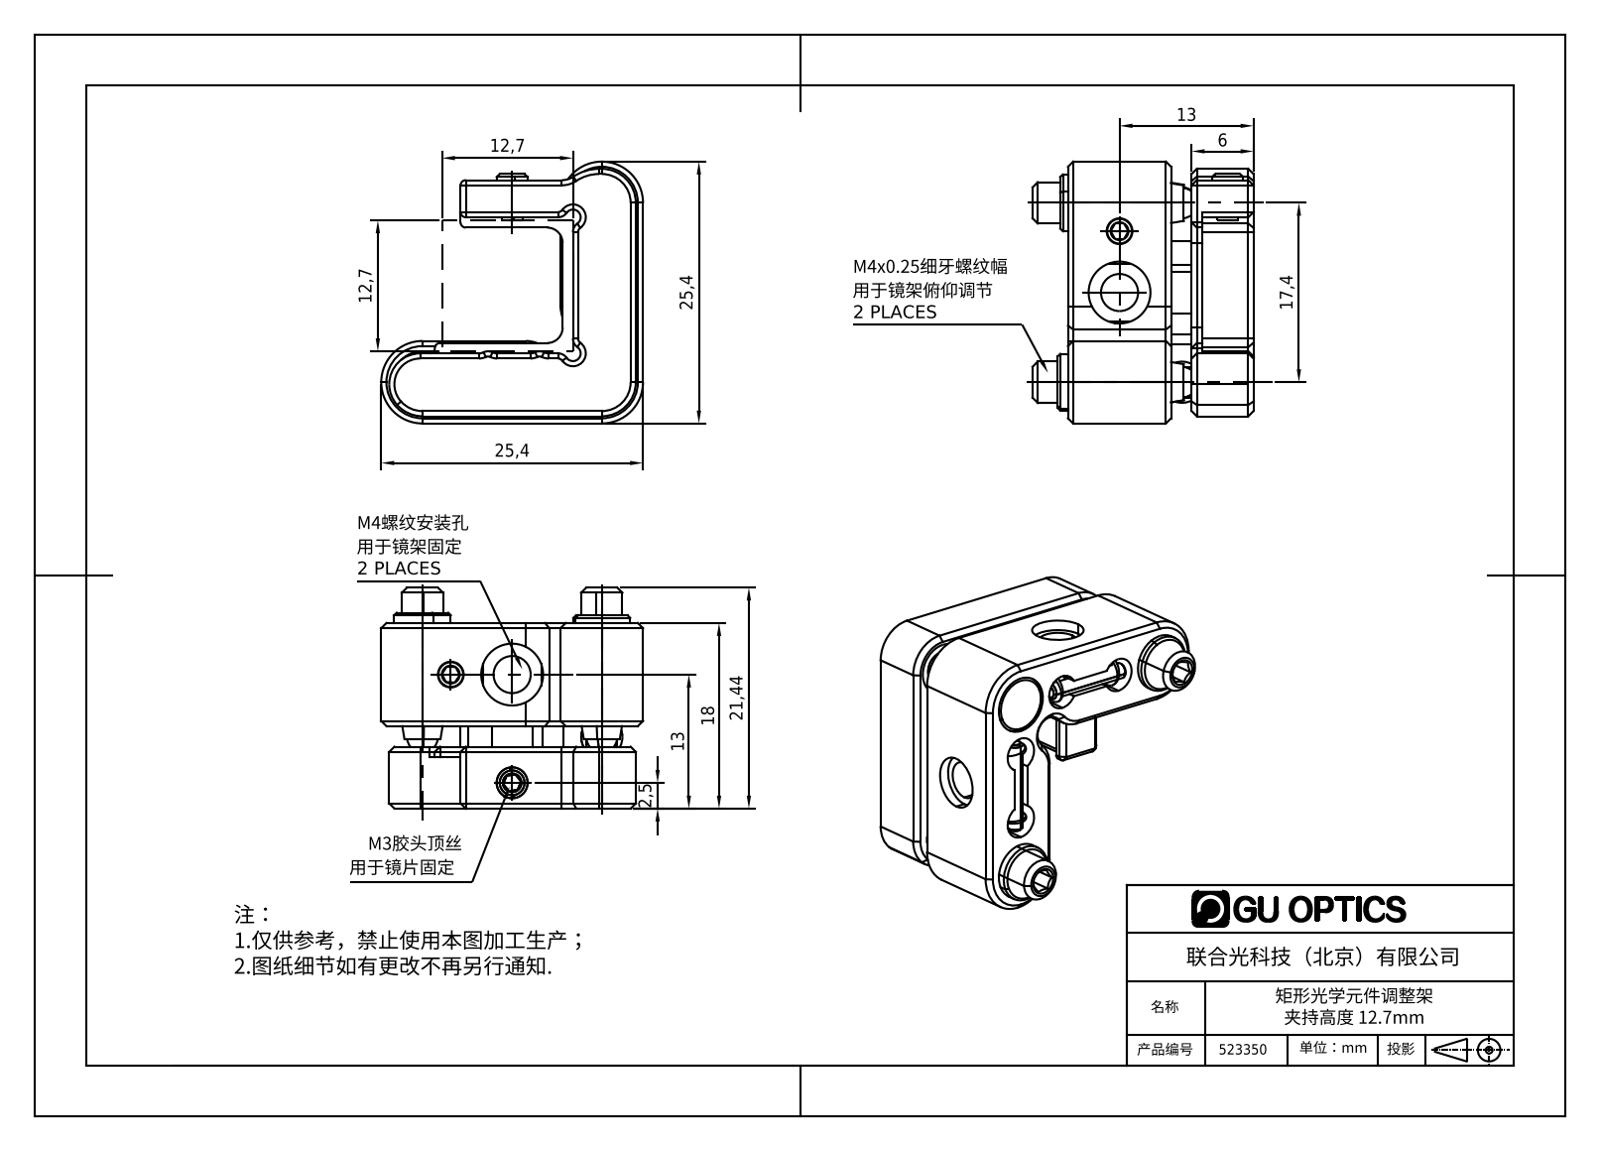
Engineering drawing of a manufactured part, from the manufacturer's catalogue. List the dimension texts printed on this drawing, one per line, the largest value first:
25,4
25,4
21,44
18
17,4
13
13
12,7
12,7
6
2,5
